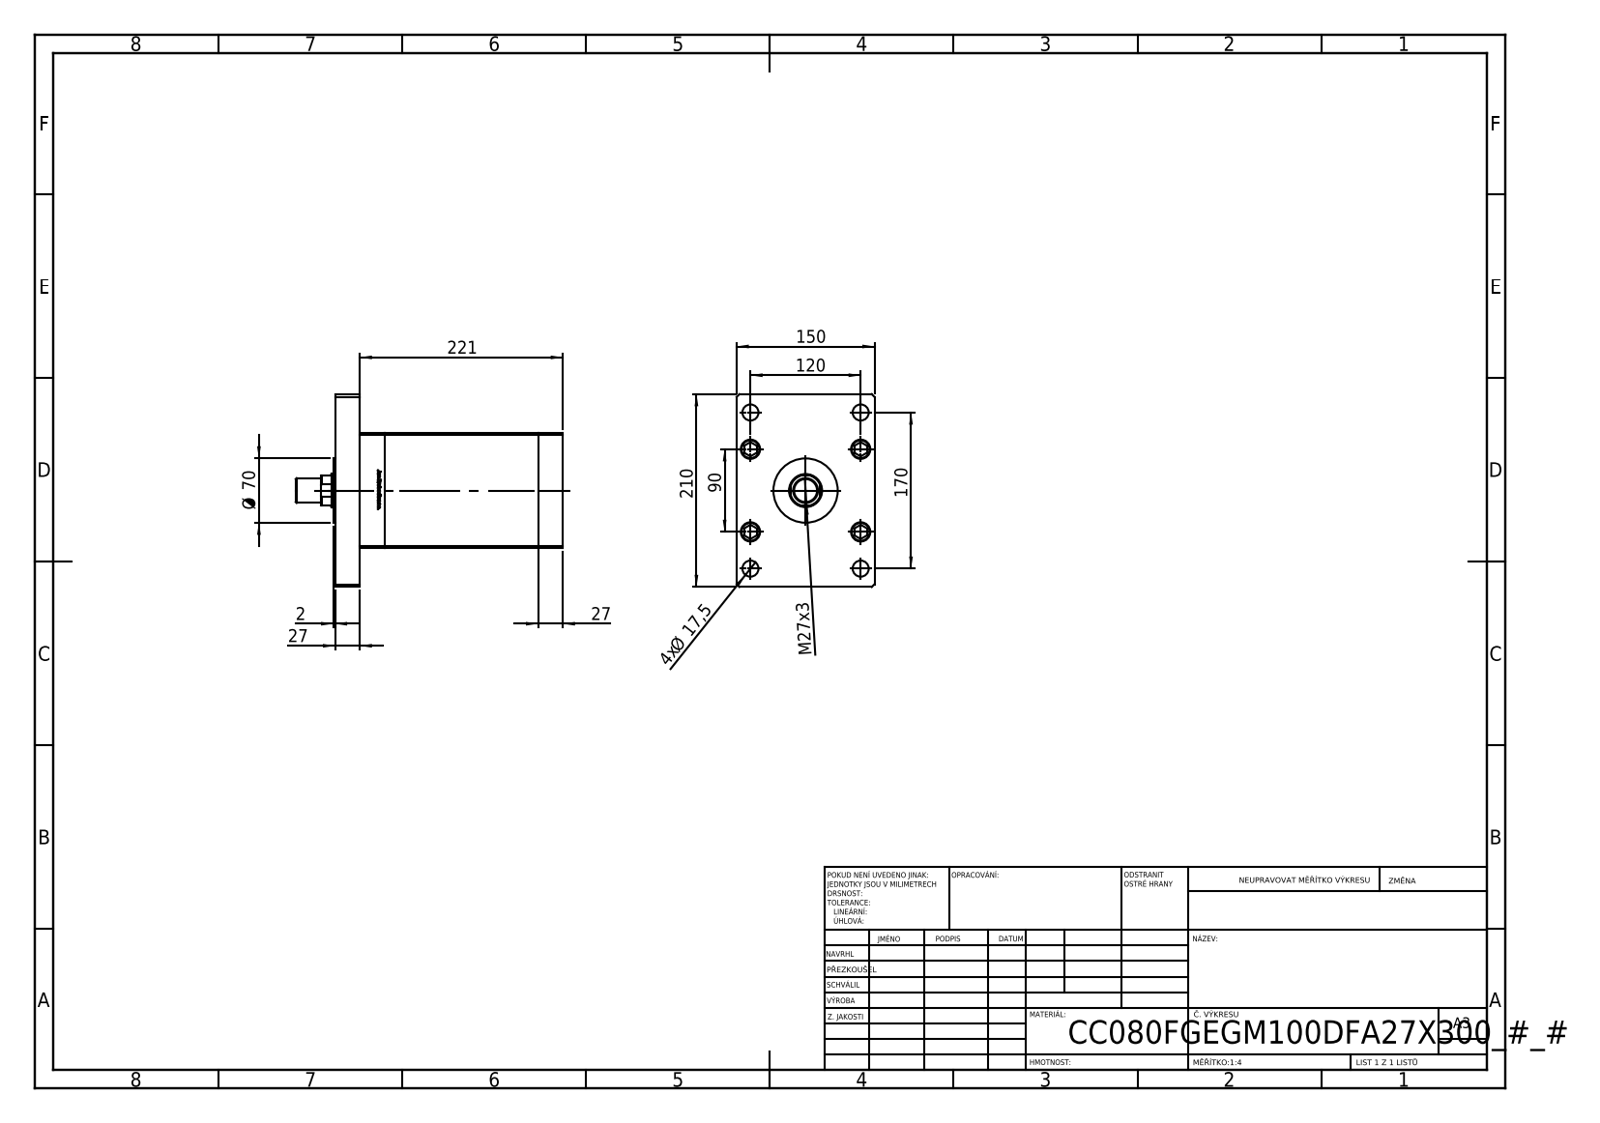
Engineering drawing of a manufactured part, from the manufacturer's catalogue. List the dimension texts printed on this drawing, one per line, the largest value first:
221
210
170
150
120
90
Ø 70
27
27
M27x3
4x Ø 17,5
2
